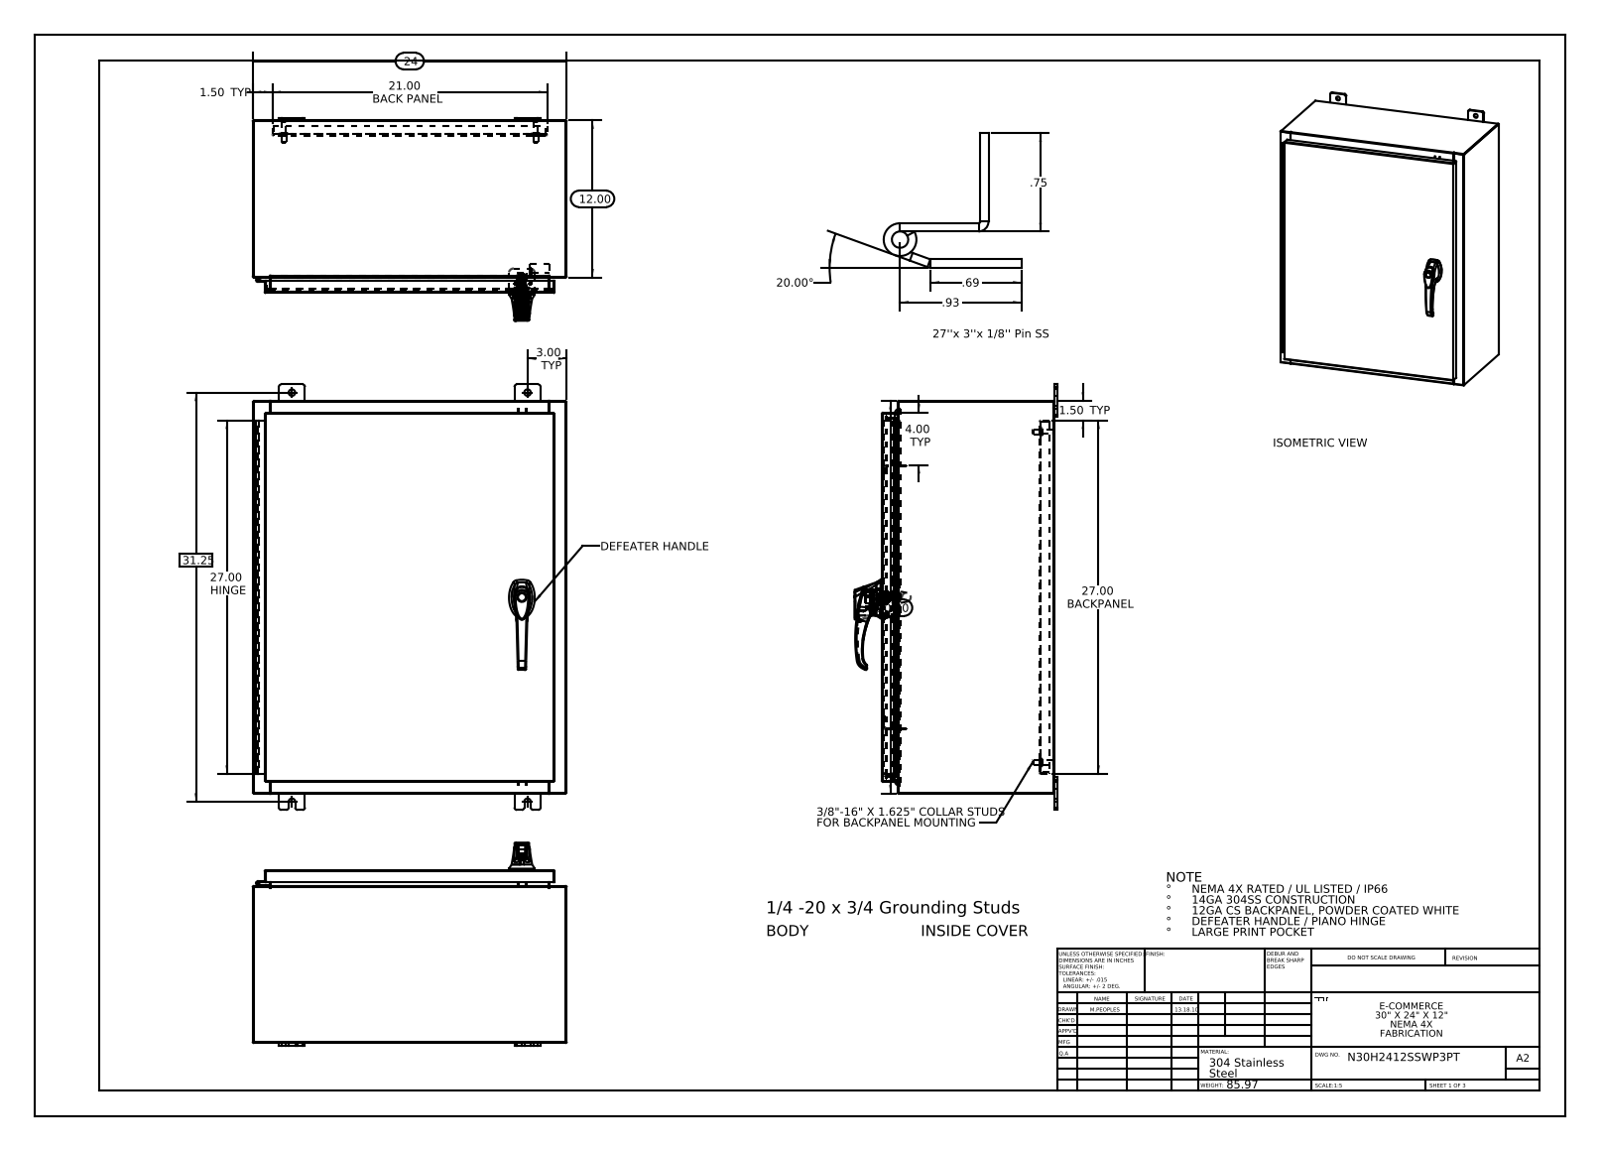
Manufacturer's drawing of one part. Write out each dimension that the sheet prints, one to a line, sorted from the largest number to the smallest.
31.25
30.00
27.00 HINGE
27.00 BACKPANEL
24
21.00 BACK PANEL
20.00°
12.00
4.00 TYP
3.00 TYP
1.50 TYP
1.50 TYP
.93
.75
.69
